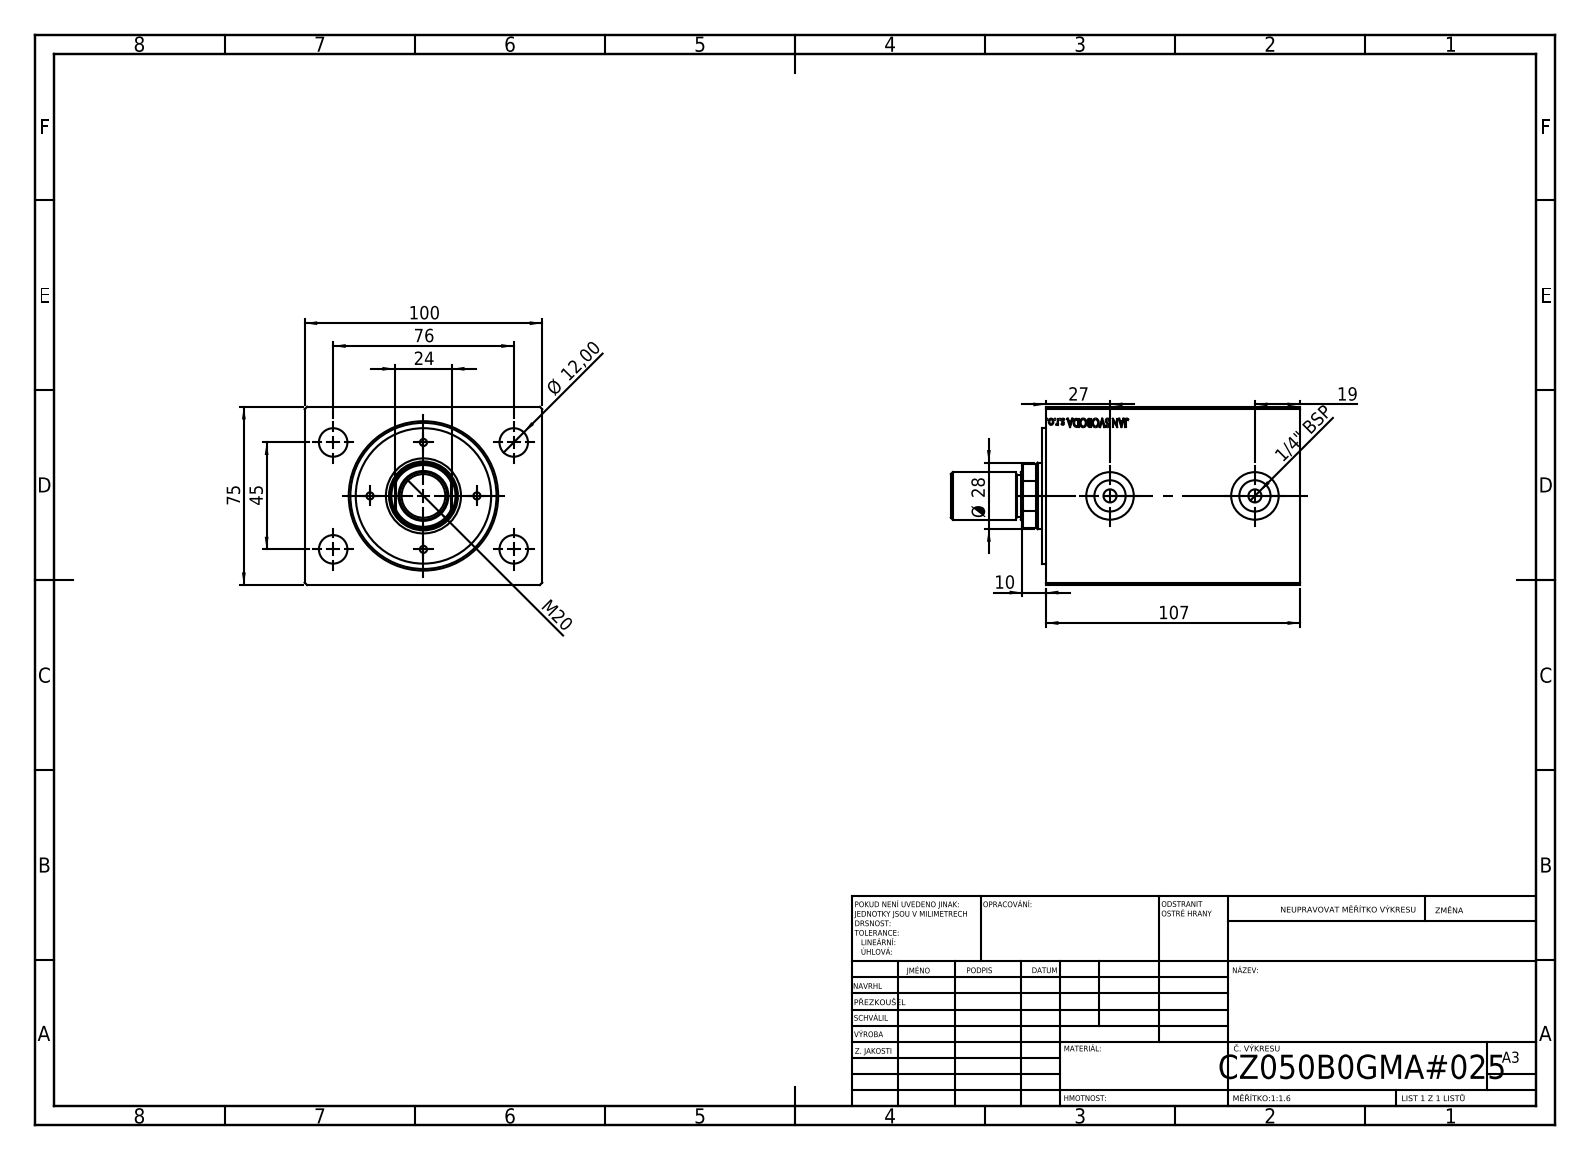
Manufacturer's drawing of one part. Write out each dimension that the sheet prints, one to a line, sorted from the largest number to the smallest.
107
100
76
75
45
Ø 28
27
24
M20
19
Ø 12,00
10
1/4" BSP
